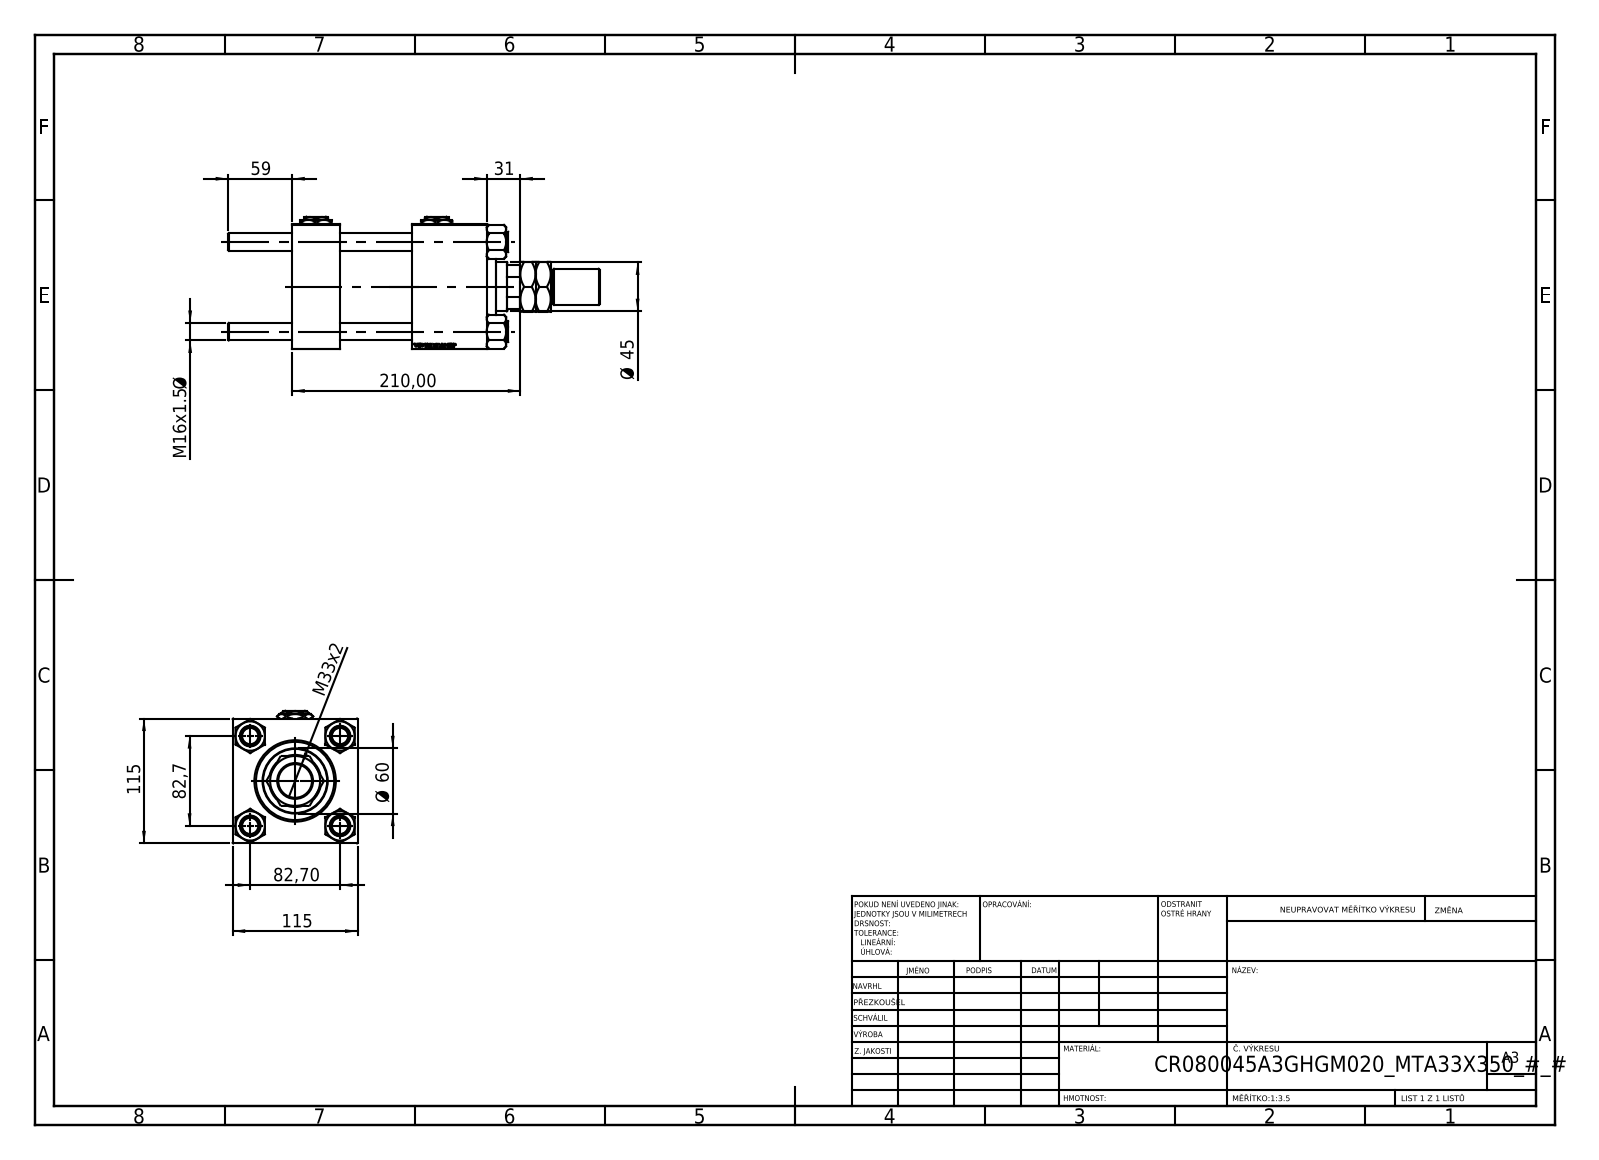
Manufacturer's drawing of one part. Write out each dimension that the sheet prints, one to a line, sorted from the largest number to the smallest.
210,00
115
115
82,7
82,70
Ø 60
59
Ø 45
M33x2
31
M16x1.5 Ø
